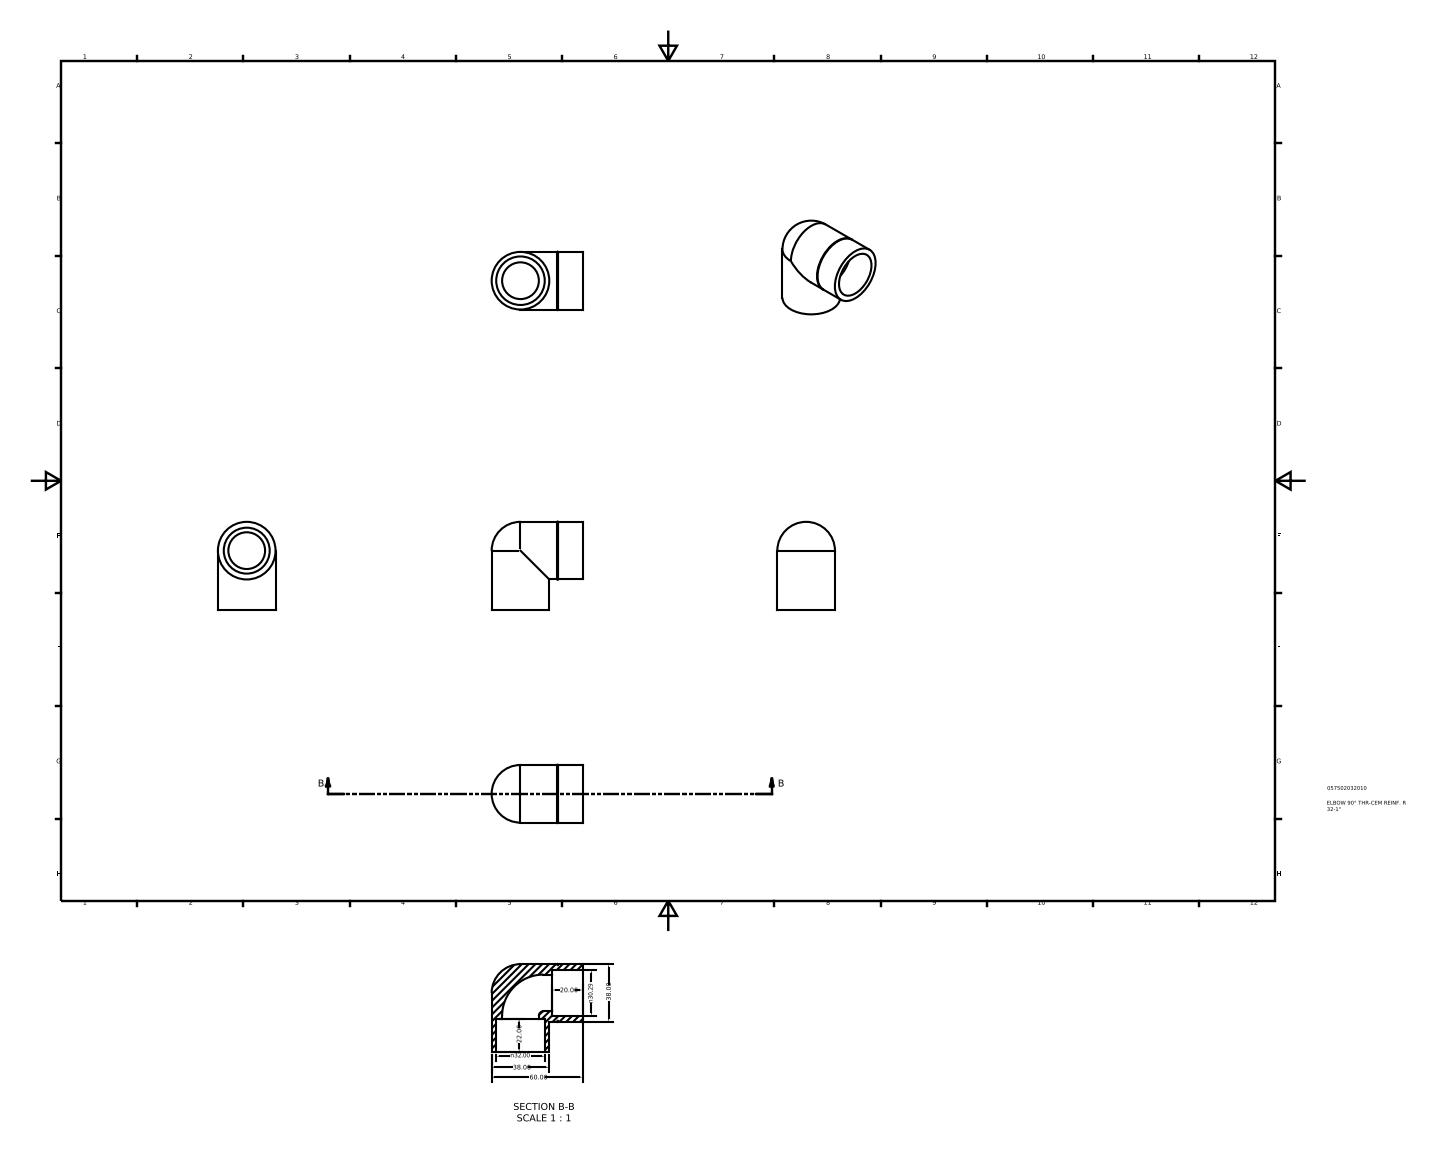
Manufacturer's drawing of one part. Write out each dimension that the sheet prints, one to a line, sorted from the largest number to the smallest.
60.00
38.00
38.00
n32.00
n30.29
22.00
20.00
